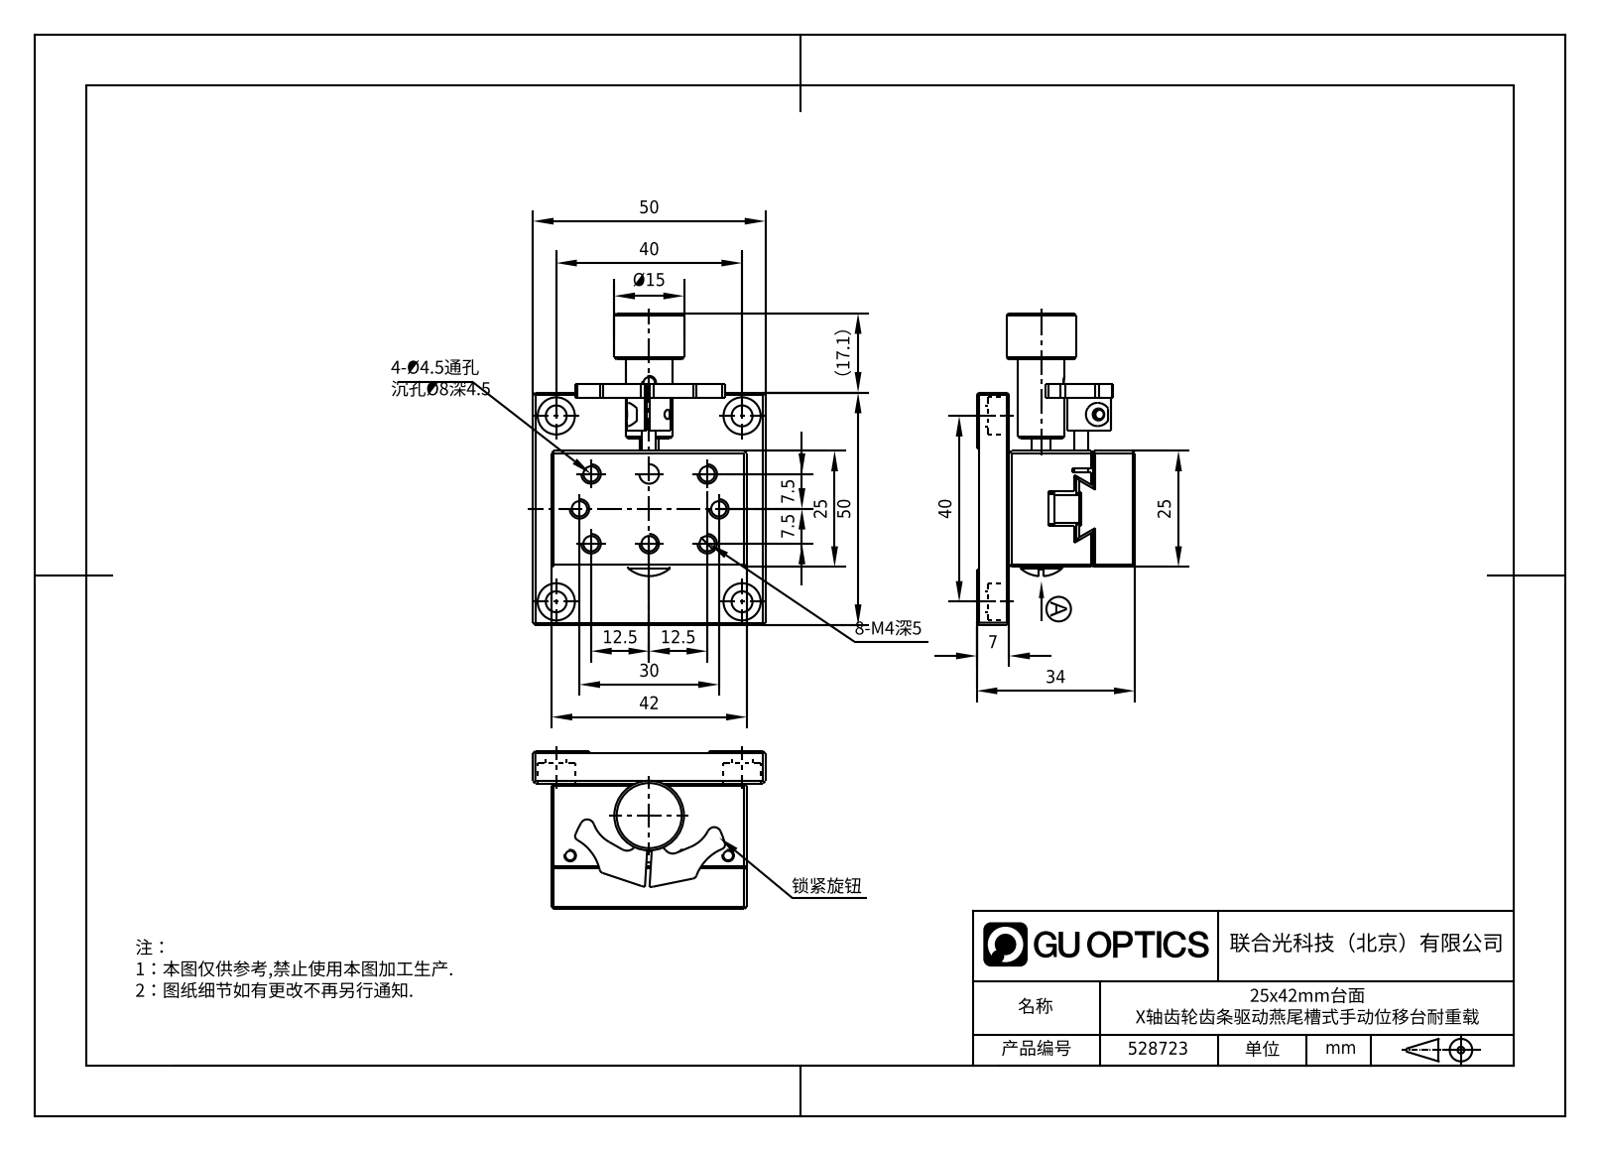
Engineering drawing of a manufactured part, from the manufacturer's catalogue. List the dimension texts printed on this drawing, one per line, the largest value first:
50
50
42
40
40
34
30
25
25
（17.1）
Ø15
12.5
12.5
7.5
7.5
7
